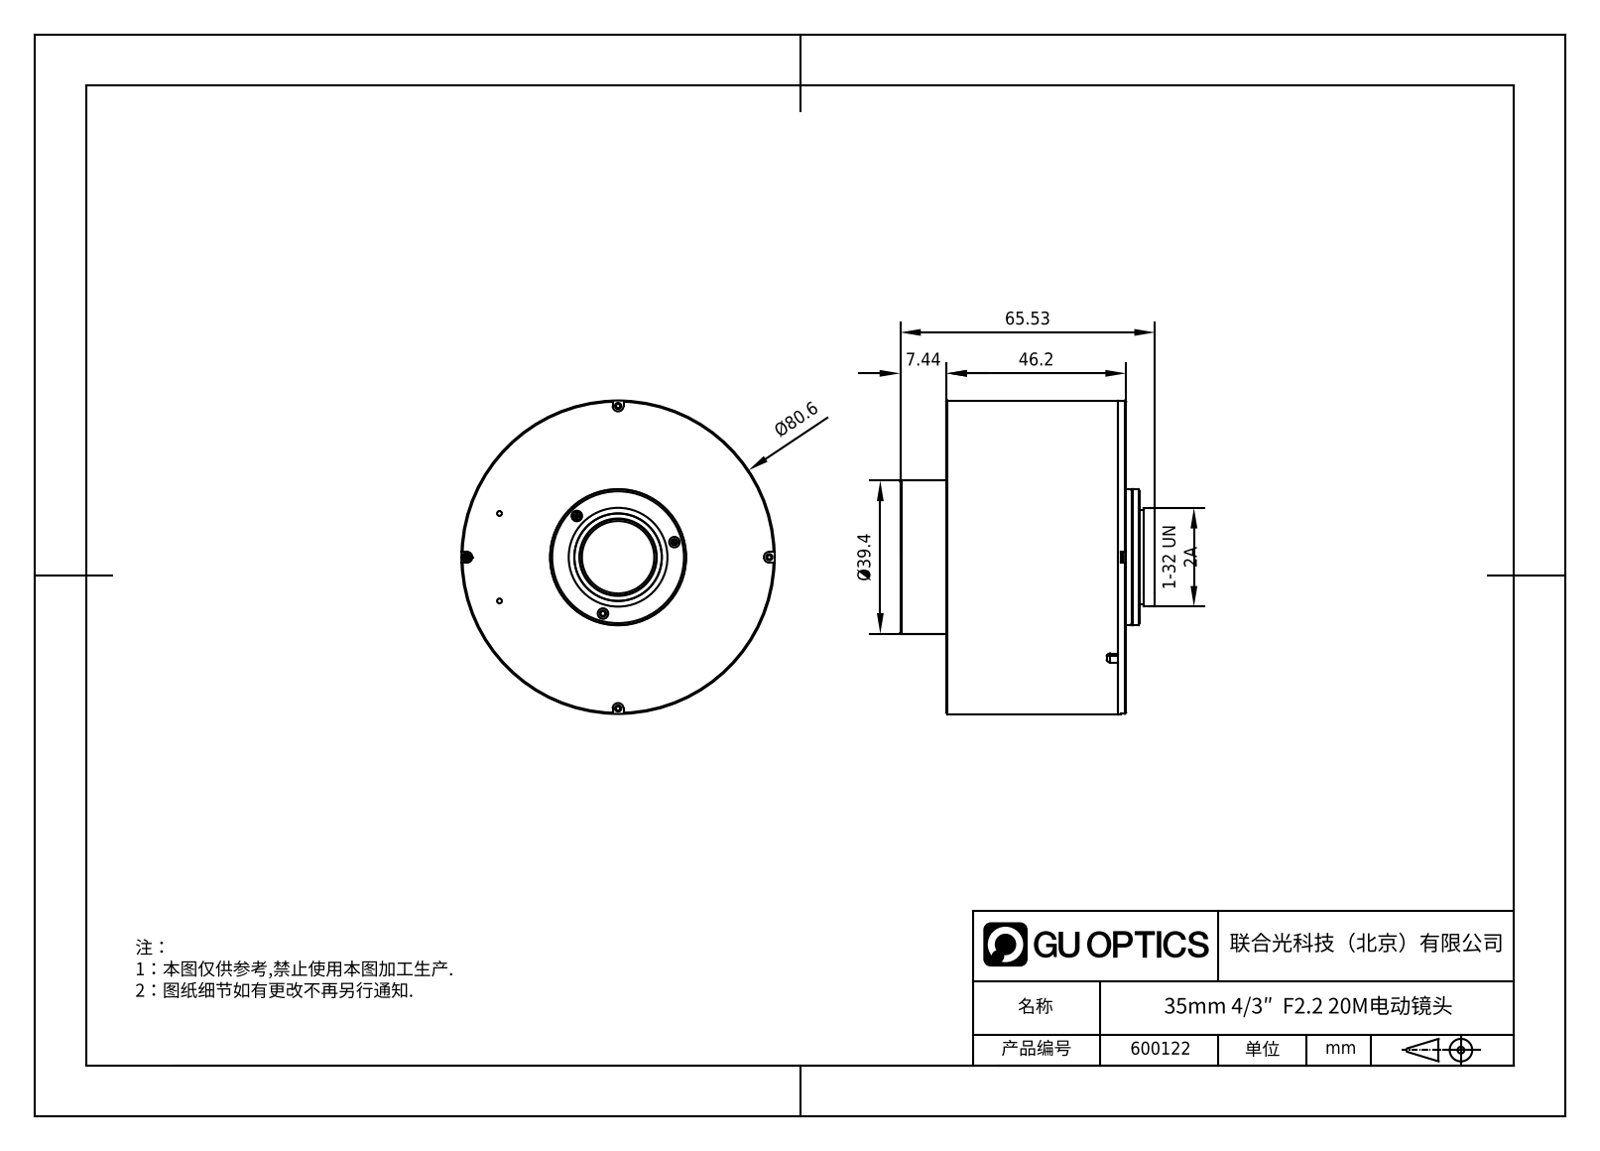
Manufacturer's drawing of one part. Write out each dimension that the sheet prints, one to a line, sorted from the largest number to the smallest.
Ø80.6
65.53
46.2
Ø39.4
7.44
1-32 UN 2A
